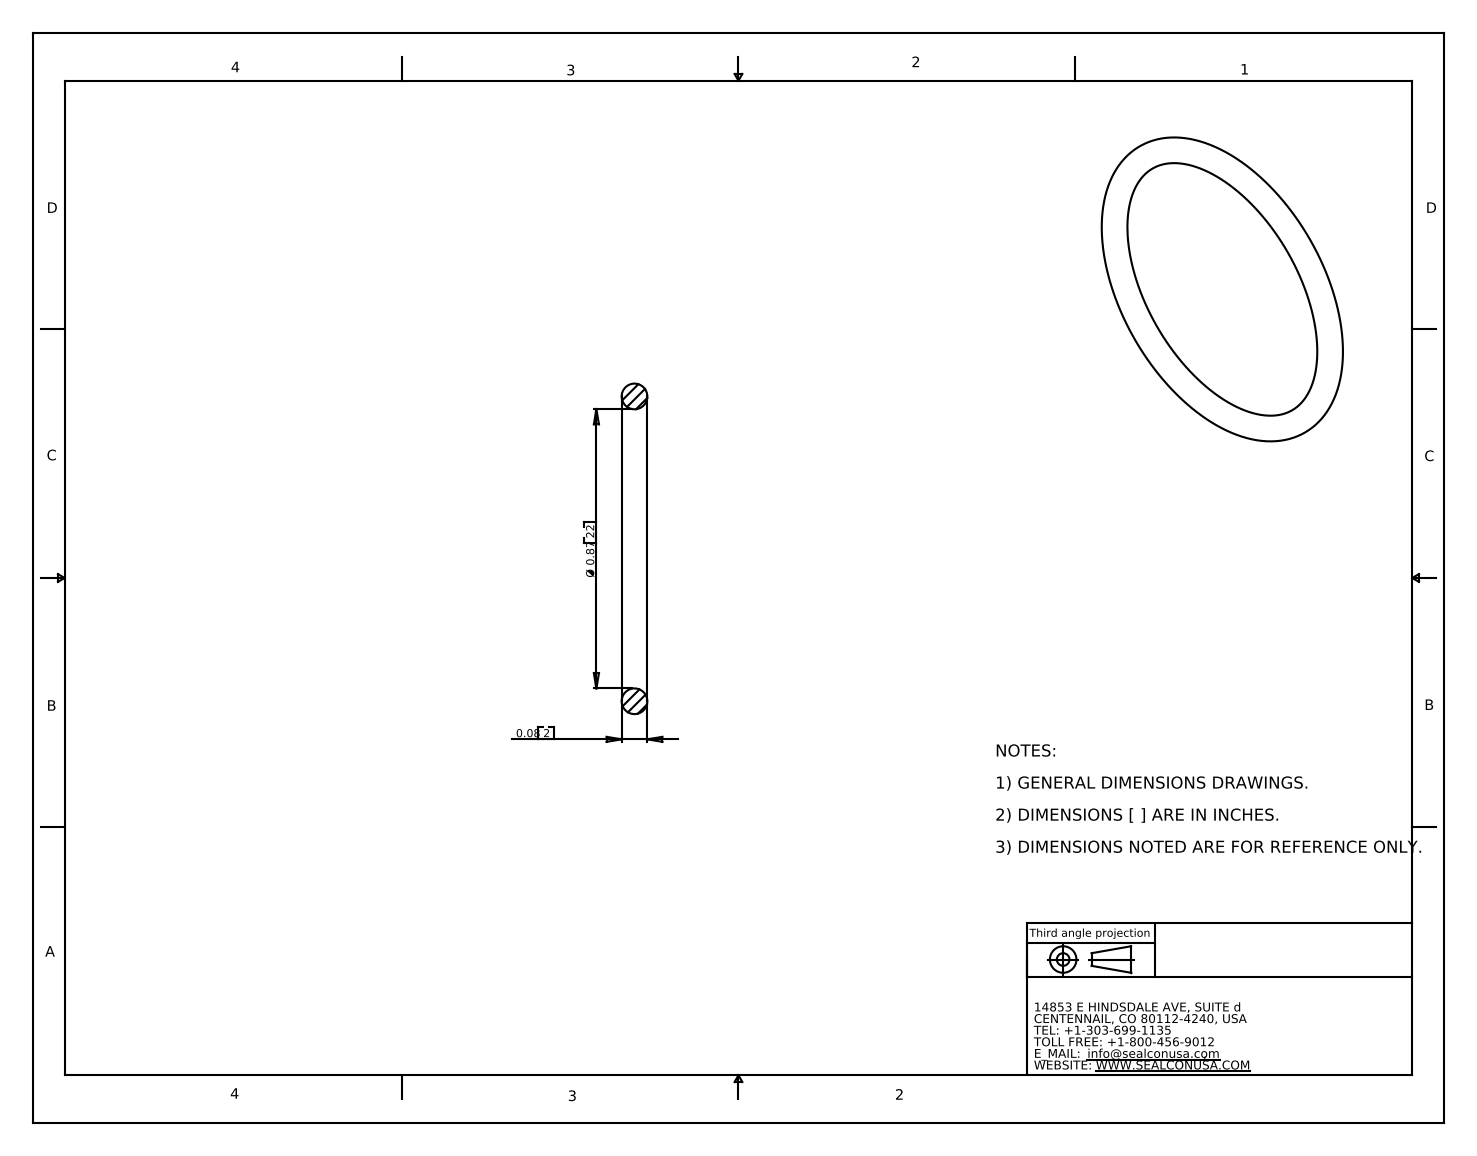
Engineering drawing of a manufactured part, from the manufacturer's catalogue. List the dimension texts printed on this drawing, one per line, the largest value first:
Ø 0.87 22
0.08 2
